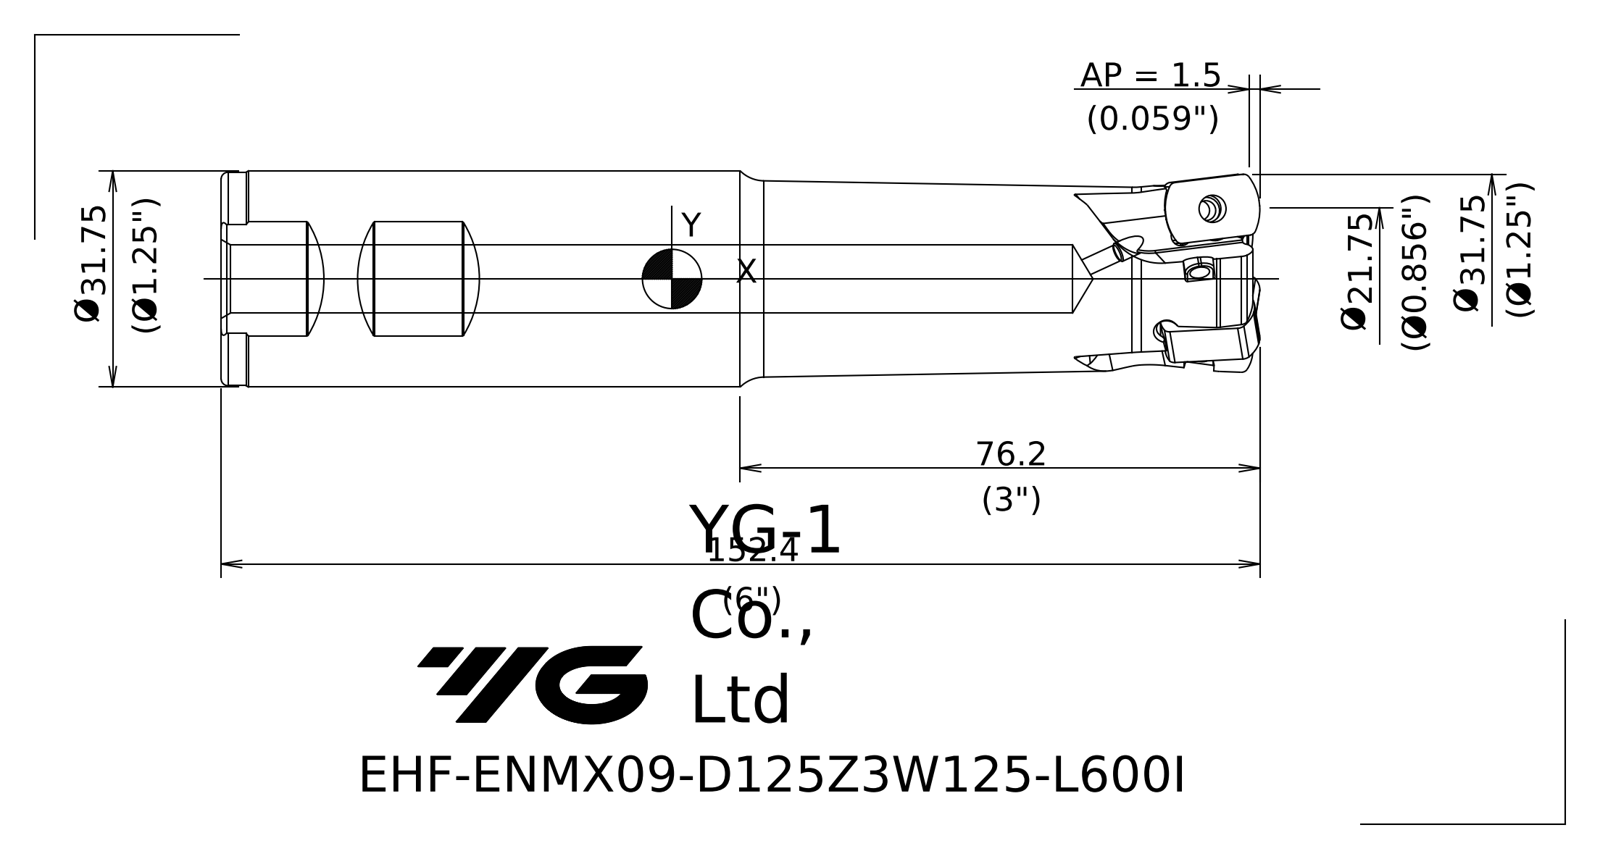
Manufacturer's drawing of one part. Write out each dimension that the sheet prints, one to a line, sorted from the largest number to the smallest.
31.75 Ø
21.75 Ø
AP = 1.5
